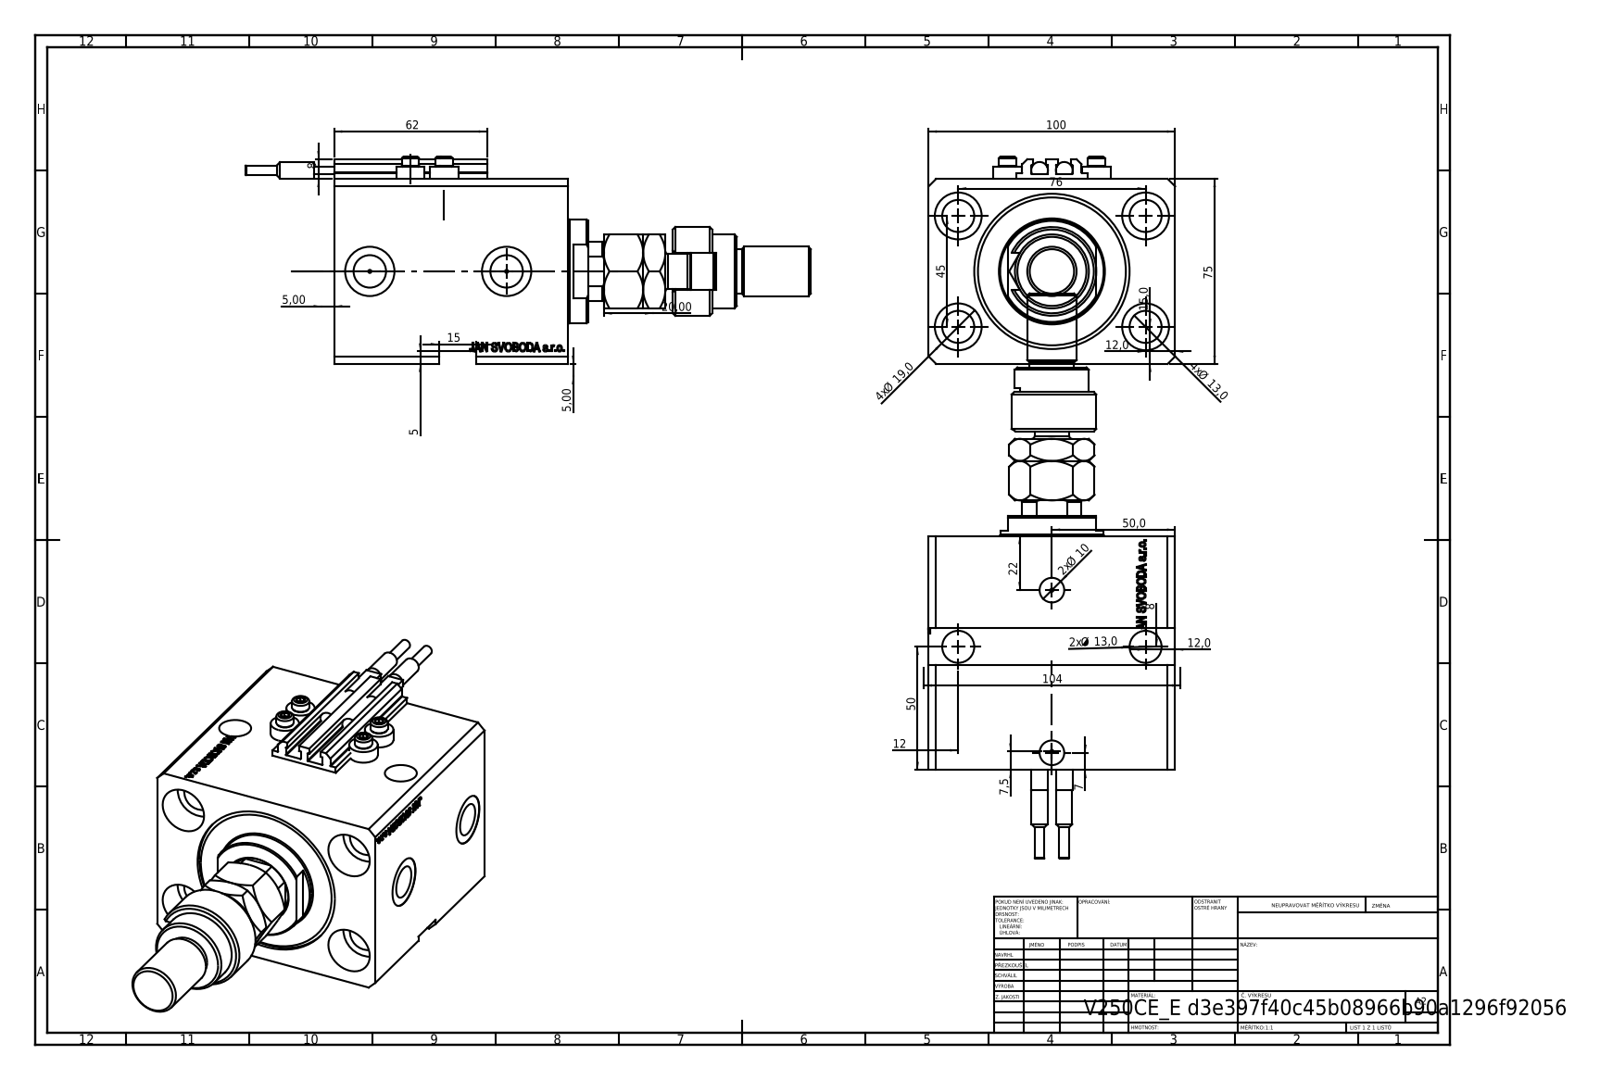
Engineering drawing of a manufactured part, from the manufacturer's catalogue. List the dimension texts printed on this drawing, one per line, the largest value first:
104
100
76
75
62
50,0
50
45
22
20,00
4x Ø 19,0
15,0
15
4x Ø 13,0
2x Ø 13,0
12,0
12,0
12
2x Ø 10
8
8
7,5
7
5,00
5,00
5
